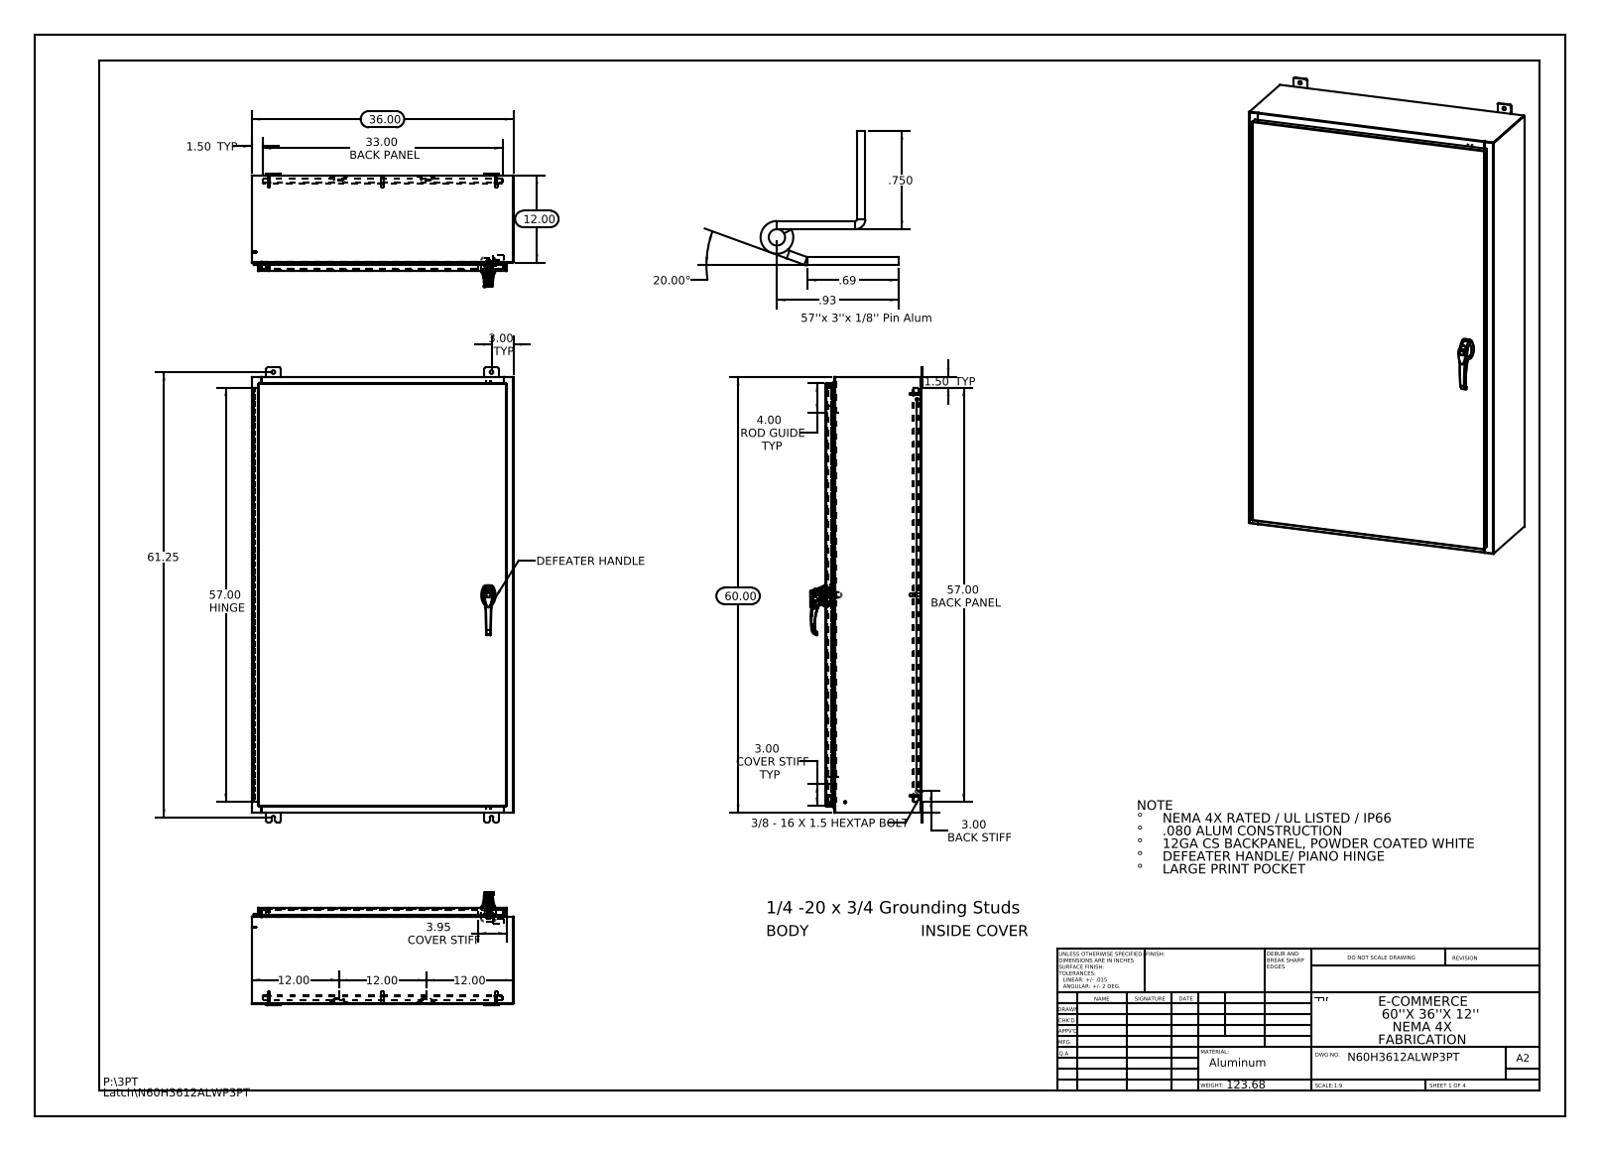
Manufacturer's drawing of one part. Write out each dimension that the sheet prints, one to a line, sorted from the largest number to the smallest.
61.25
60.00
57.00 HINGE
57.00 BACK PANEL
36.00
33.00 BACK PANEL
20.00°
12.00
12.00
12.00
12.00
4.00 ROD GUIDE TYP
3.95 COVER STIFF
3.00 TYP
3.00 BACK STIFF
3.00 COVER STIFF TYP
1.50 TYP
1.50 TYP
.93
.750
.69
